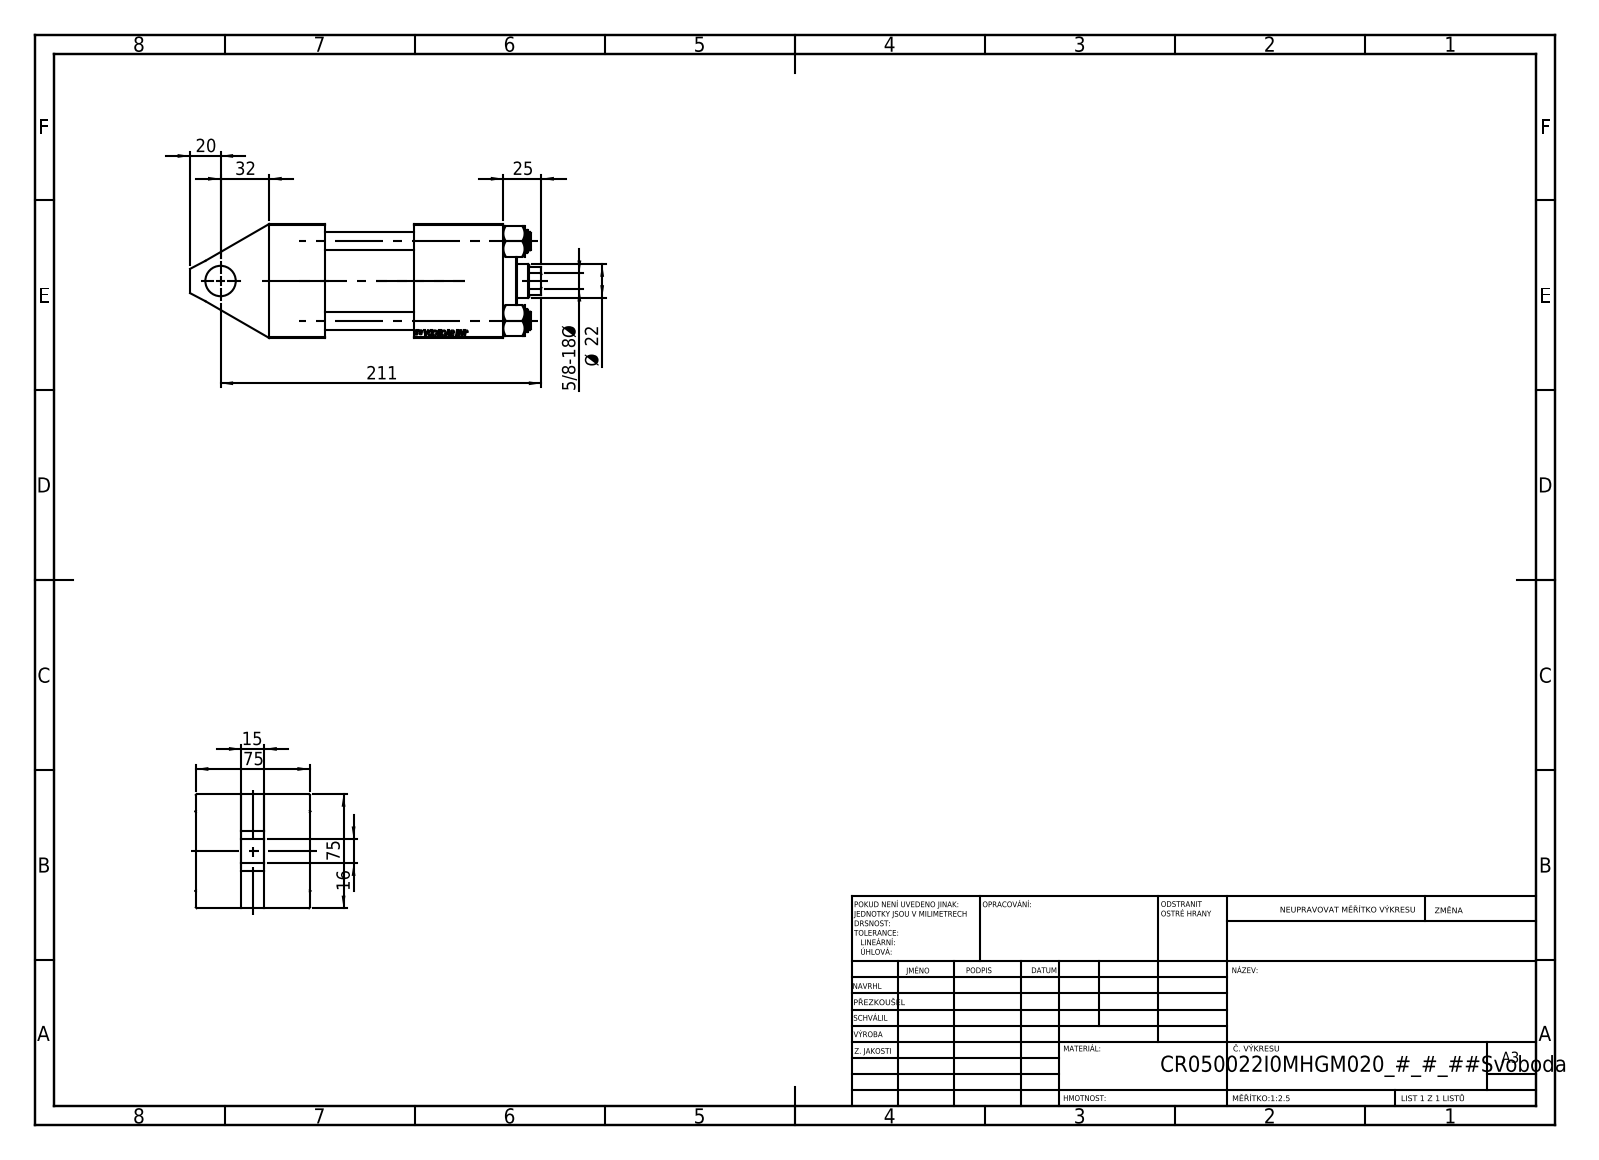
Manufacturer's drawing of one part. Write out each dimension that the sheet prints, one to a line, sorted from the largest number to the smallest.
211
75
75
32
25
Ø 22
20
16
15
5/8-18 Ø
